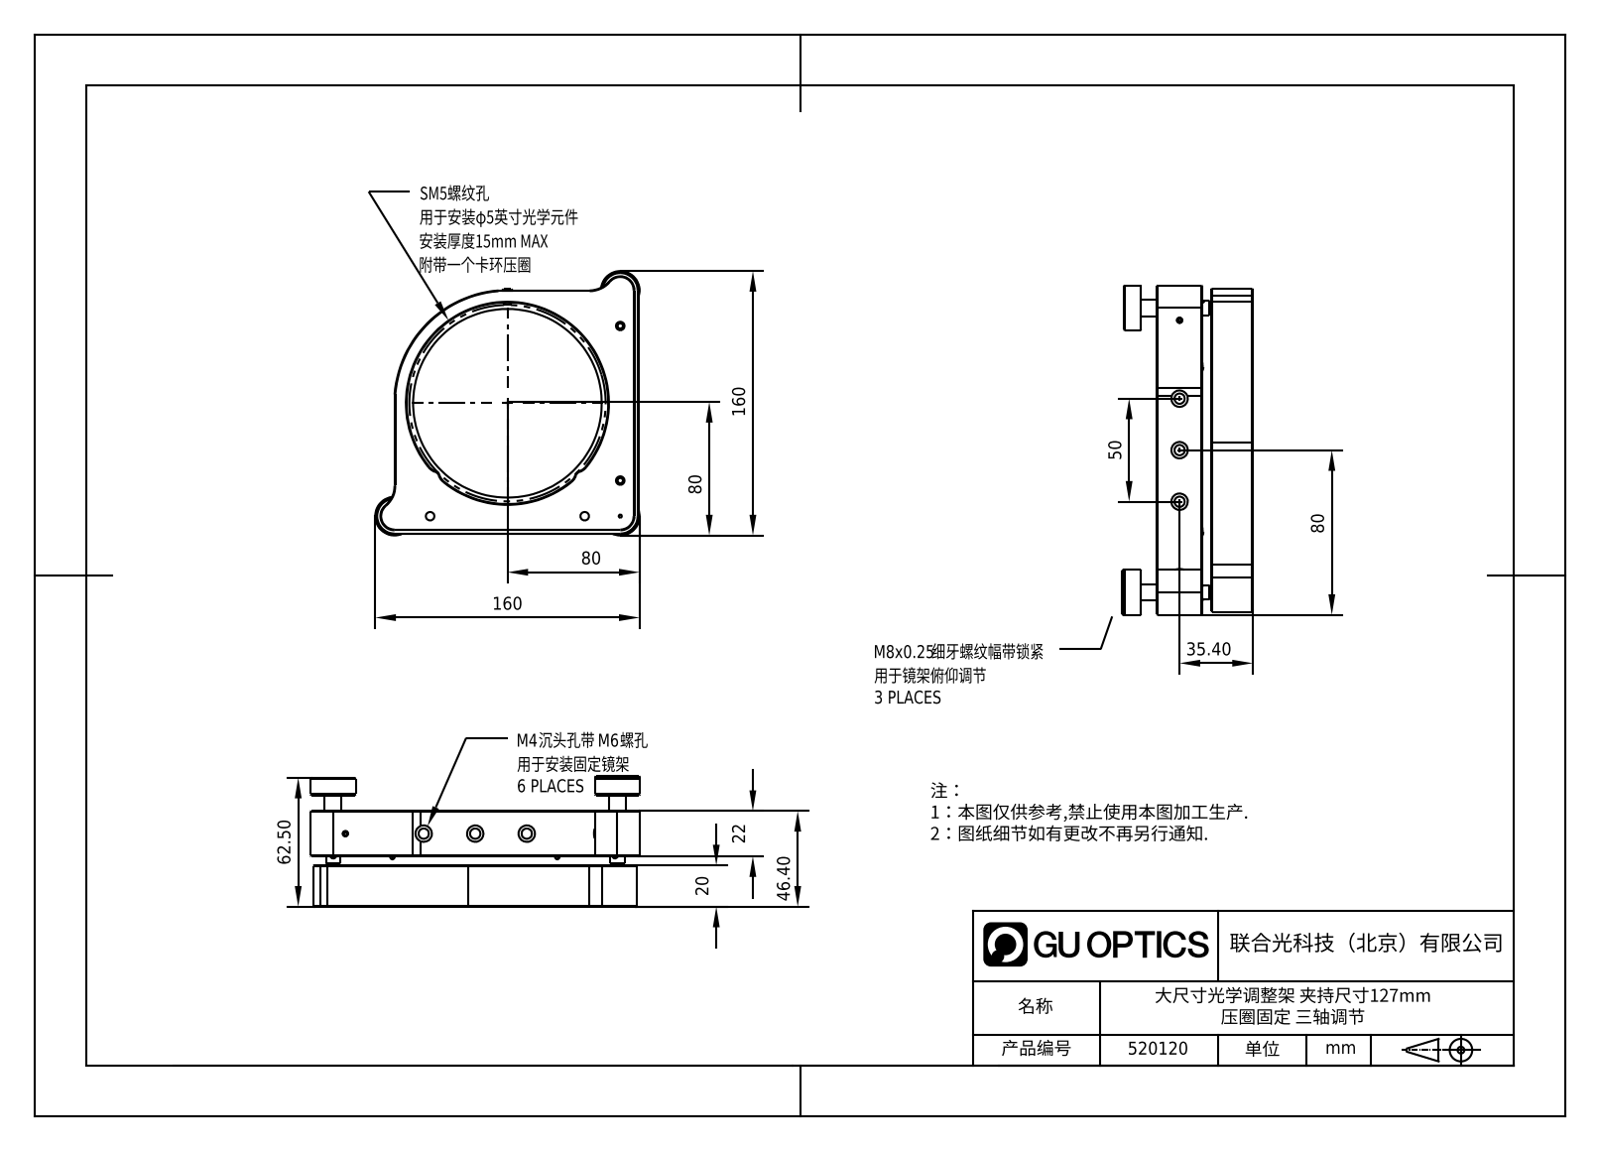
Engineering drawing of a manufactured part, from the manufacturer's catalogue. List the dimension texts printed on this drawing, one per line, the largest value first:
160
160
80
80
80
62.50
50
46.40
35.40
22
20
